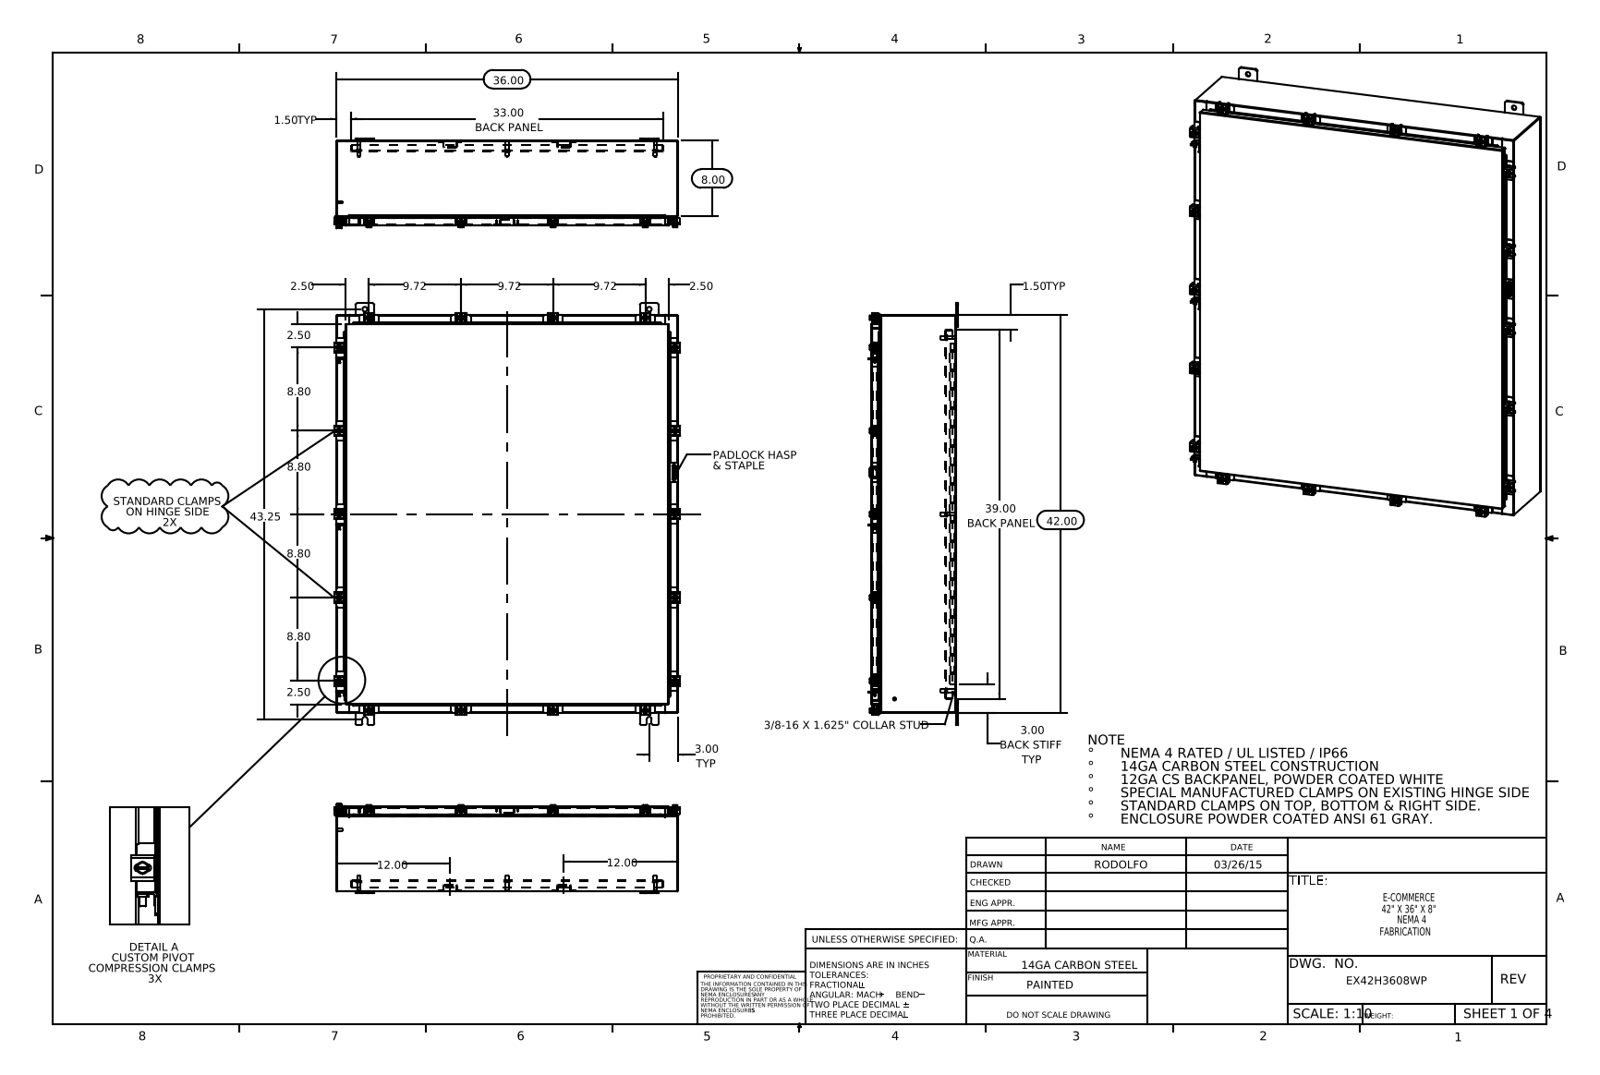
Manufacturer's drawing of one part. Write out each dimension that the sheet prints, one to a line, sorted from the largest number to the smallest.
43.25
42.00
39.00 BACK PANEL
36.00
33.00 BACK PANEL
12.00
12.00
9.72
9.72
9.72
8.80
8.80
8.80
8.80
8.00
3.00 TYP
3.00 BACK STIFF TYP
2.50
2.50
2.50
2.50
1.50 TYP
1.50 TYP
